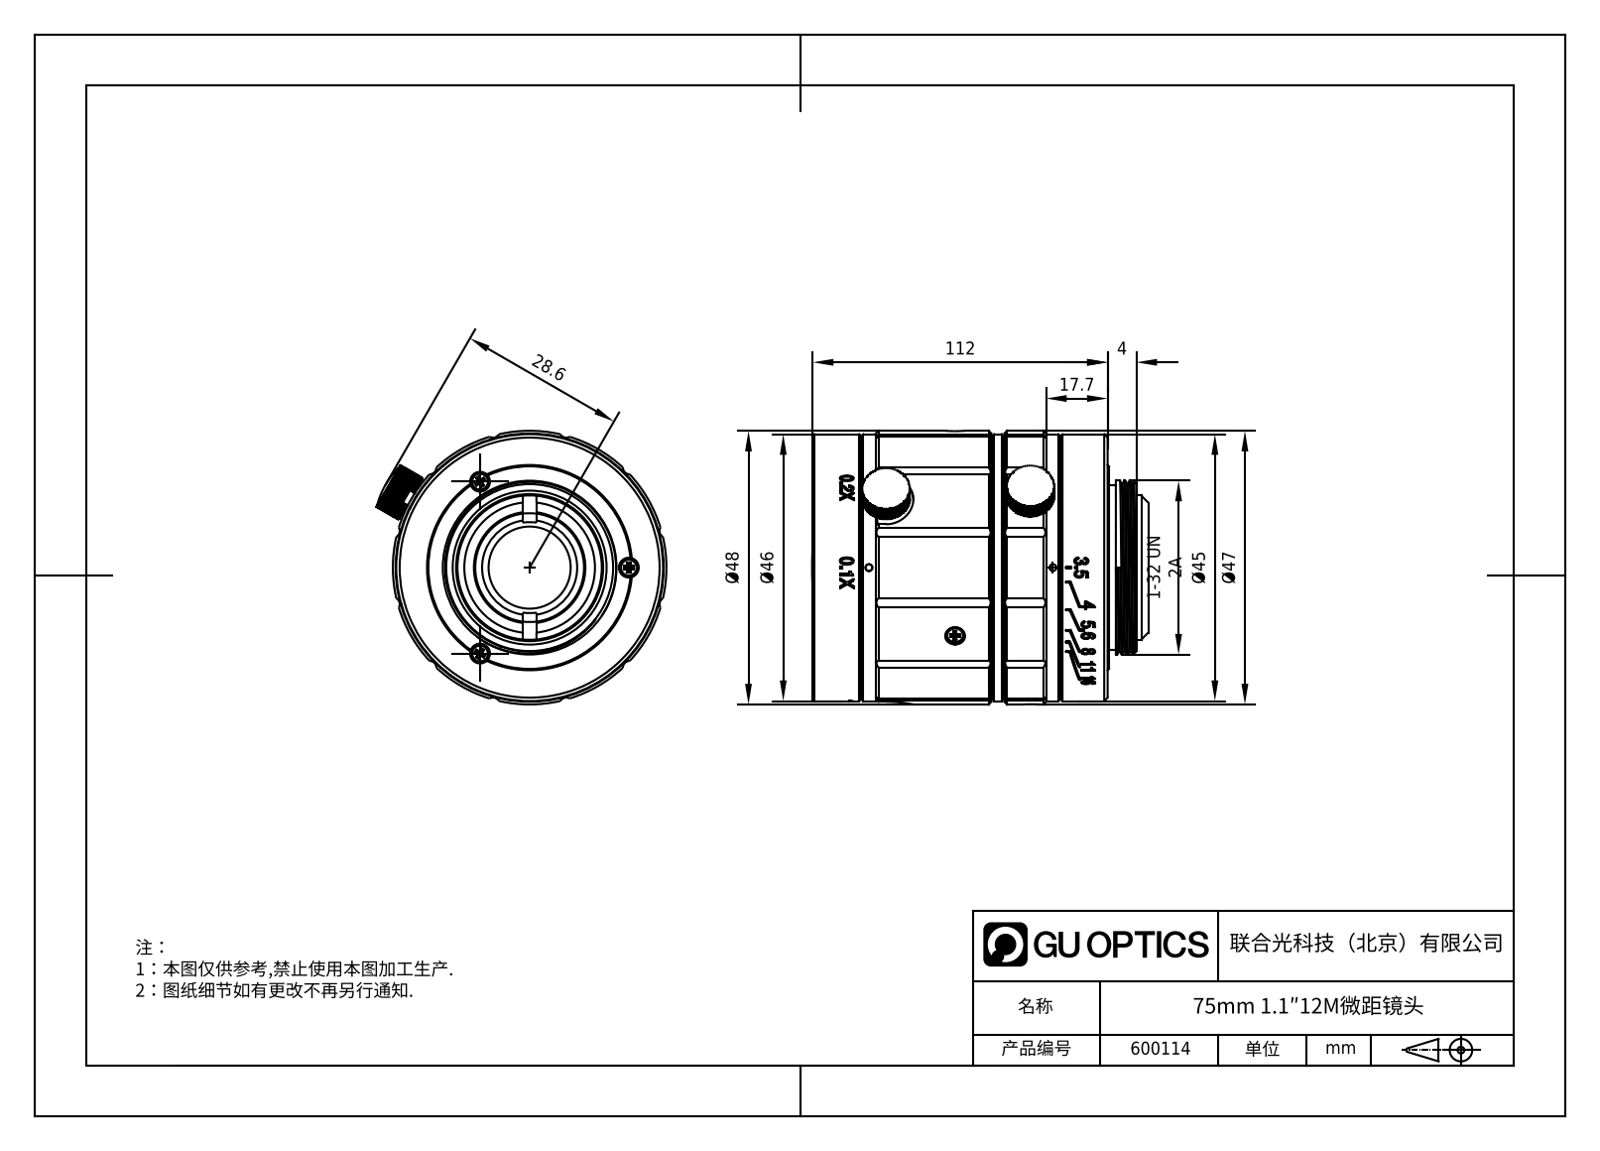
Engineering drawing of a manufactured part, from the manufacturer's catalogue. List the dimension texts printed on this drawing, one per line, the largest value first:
112
Ø48
Ø47
Ø46
Ø45
28.6
17.7
4
1-32 UN 2A
